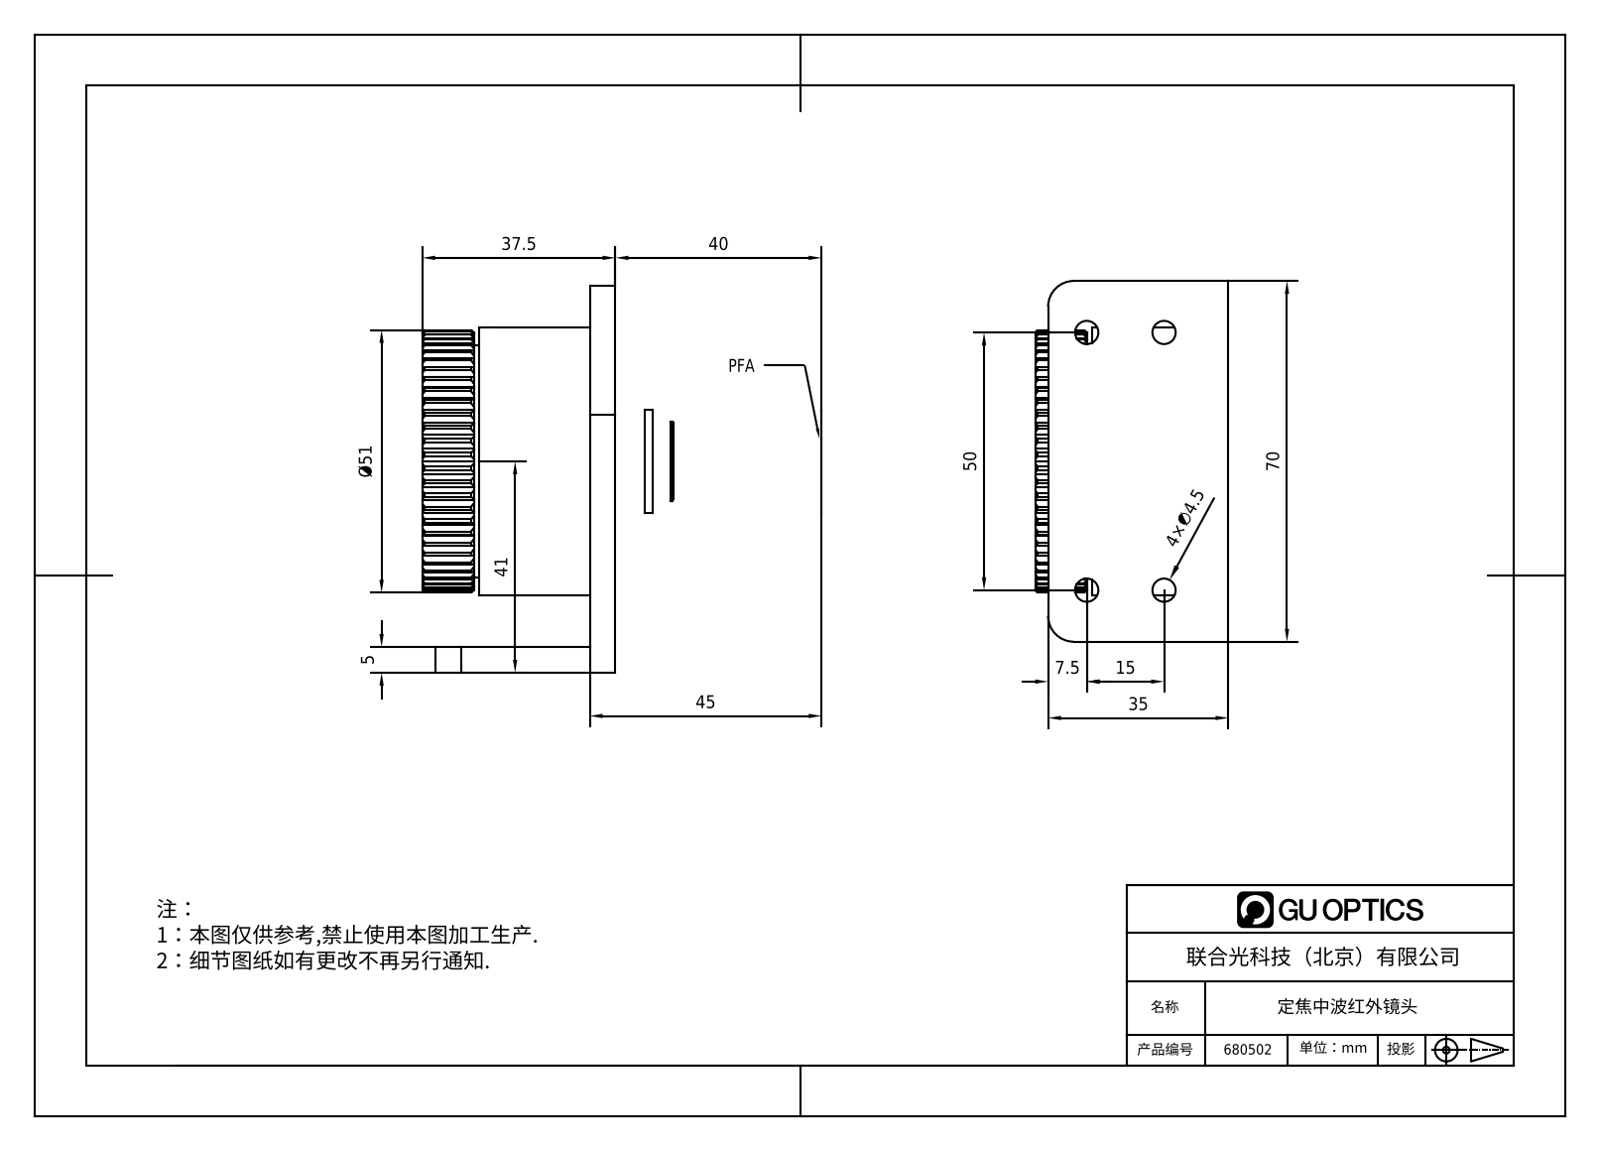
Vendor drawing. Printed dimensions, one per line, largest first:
70
Ø51
50
45
41
40
37.5
35
15
7.5
5
4×∅4.5
